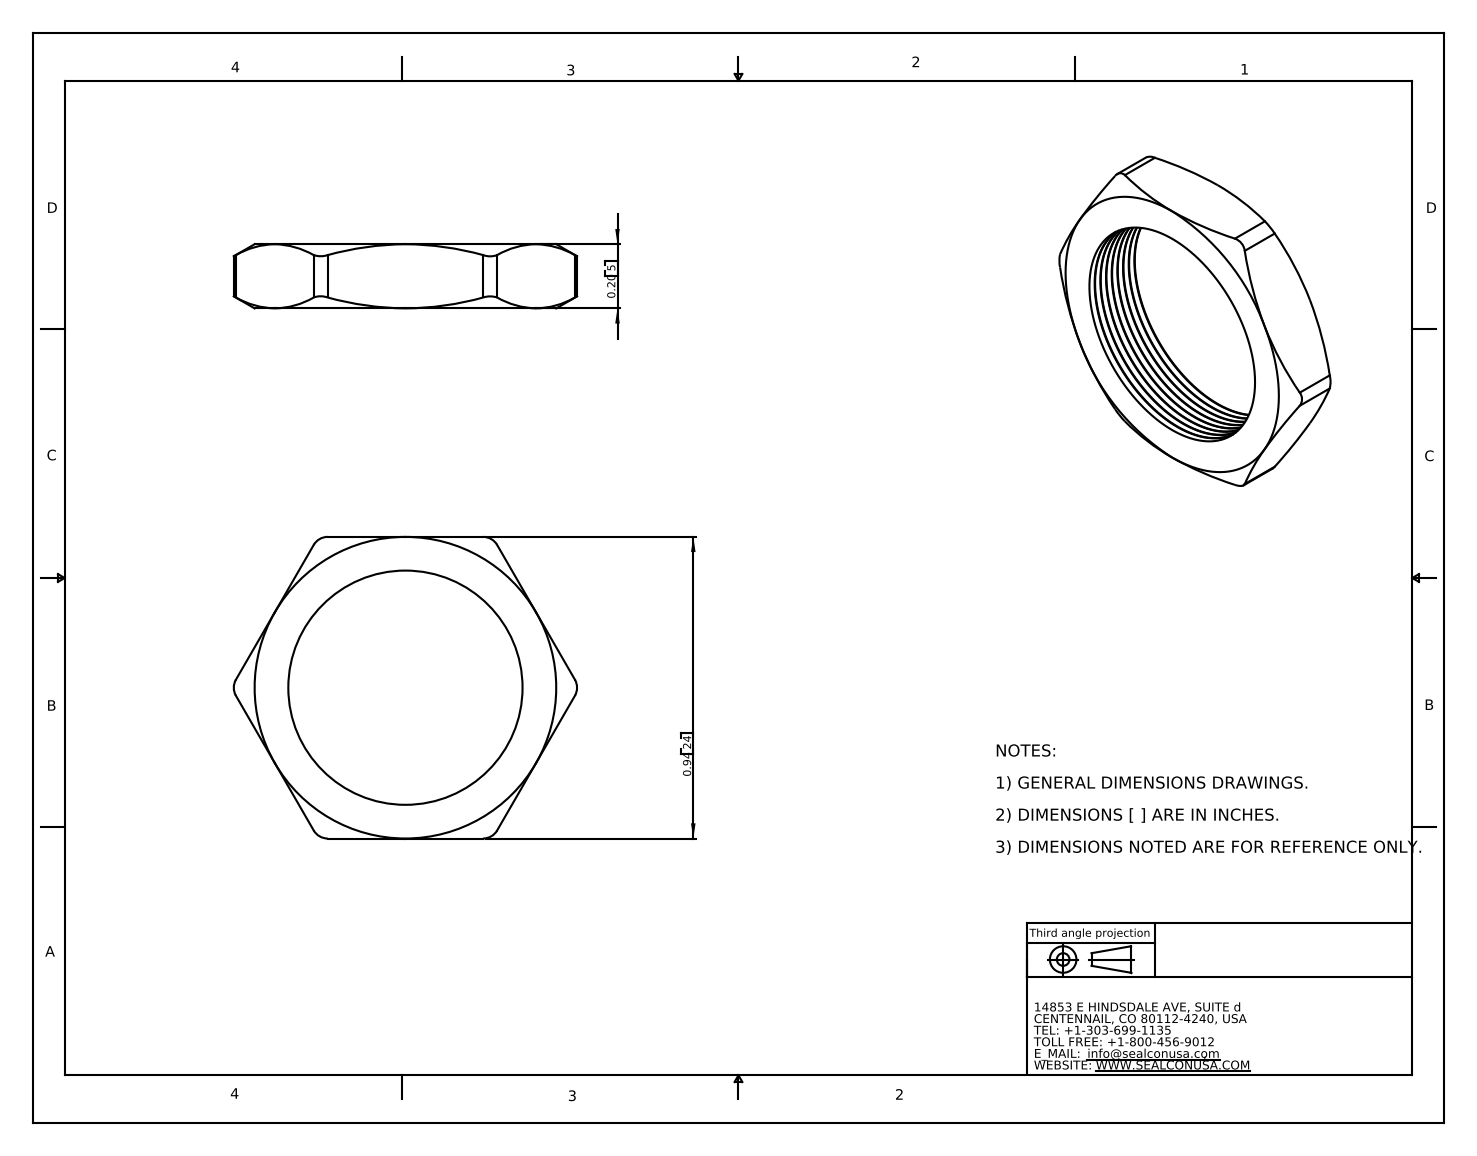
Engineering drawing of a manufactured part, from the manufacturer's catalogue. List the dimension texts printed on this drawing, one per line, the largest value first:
0.94 24
0.20 5
